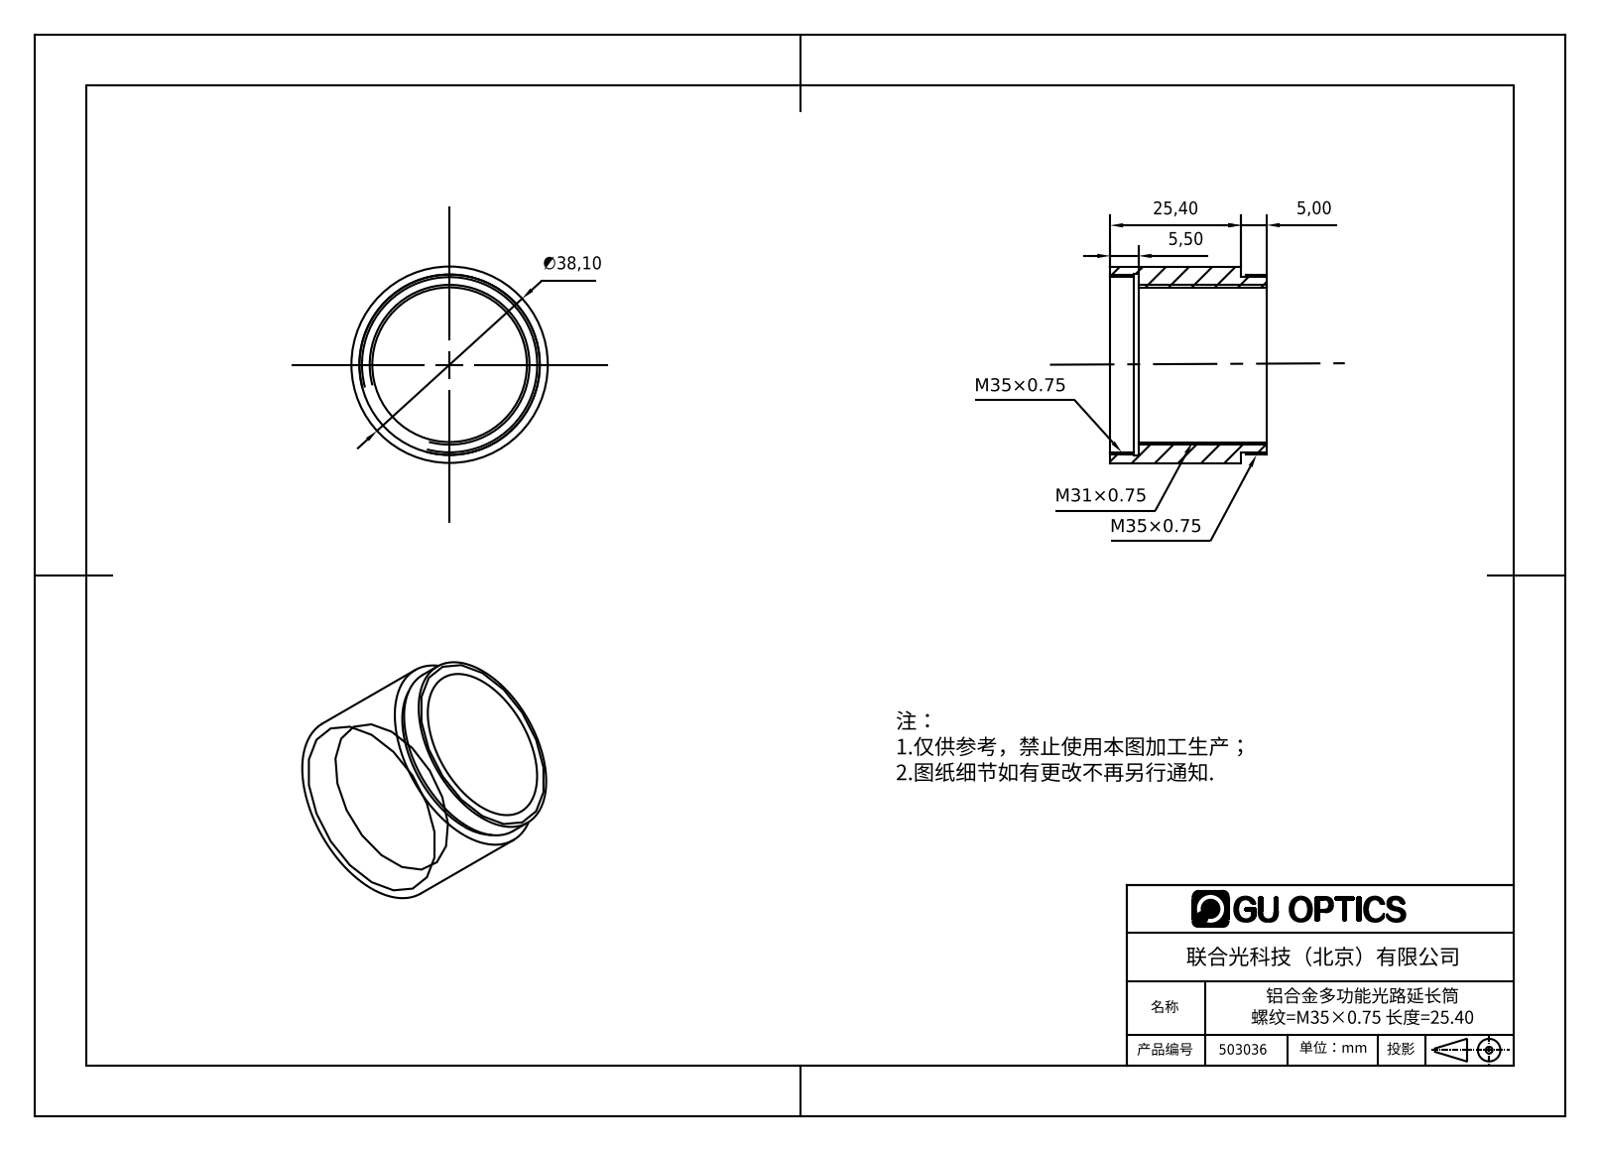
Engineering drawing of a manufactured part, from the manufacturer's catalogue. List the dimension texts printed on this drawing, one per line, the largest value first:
∅38,10
25,40
5,50
5,00
